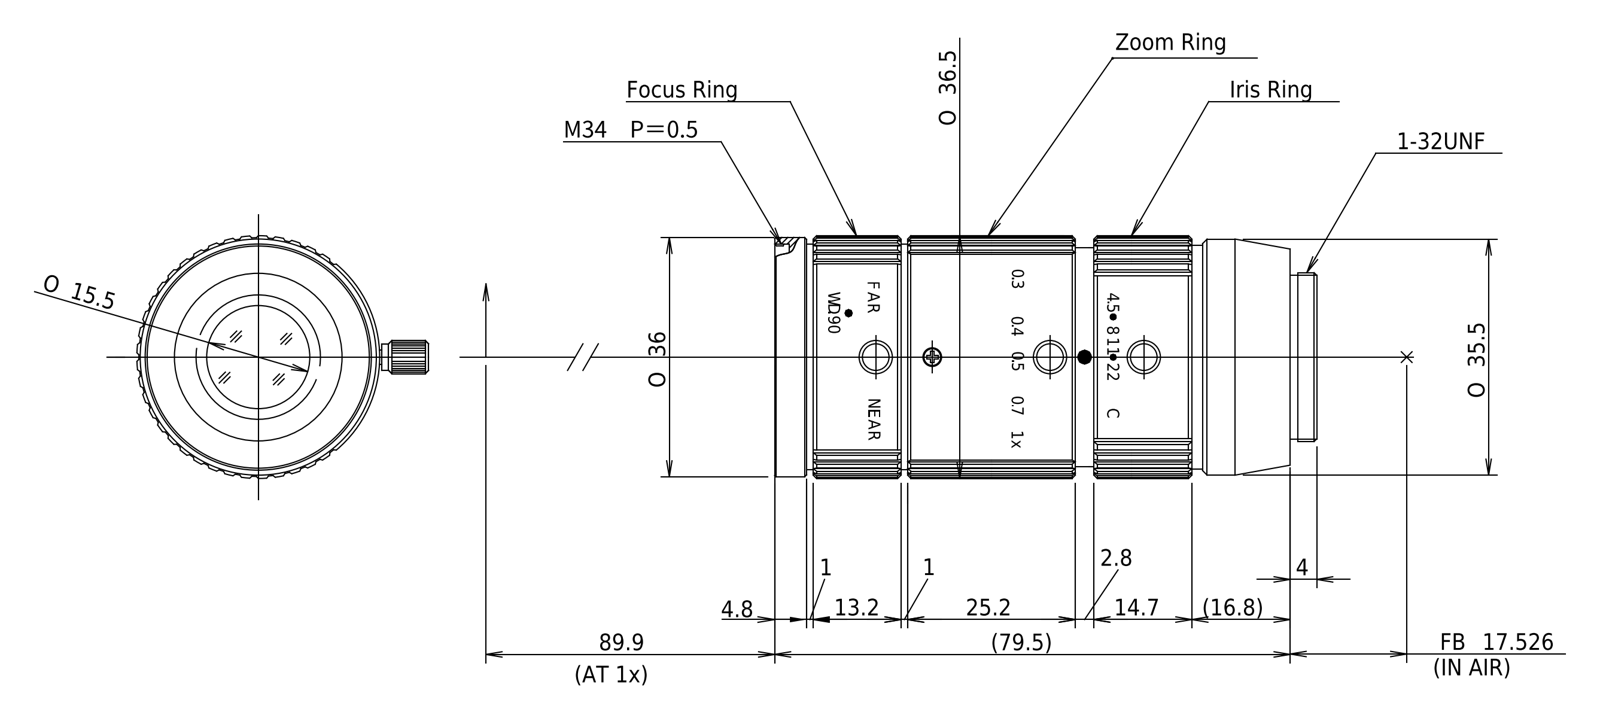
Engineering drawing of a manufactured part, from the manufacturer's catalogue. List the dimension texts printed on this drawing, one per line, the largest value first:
103
89.9
(79.5)
36.5 O
36 O
36 O
35.5 O
25.2
17.526 FB
(16.8)
O 15.5
14.7
13.2
13.1
4
2.8
1
1
